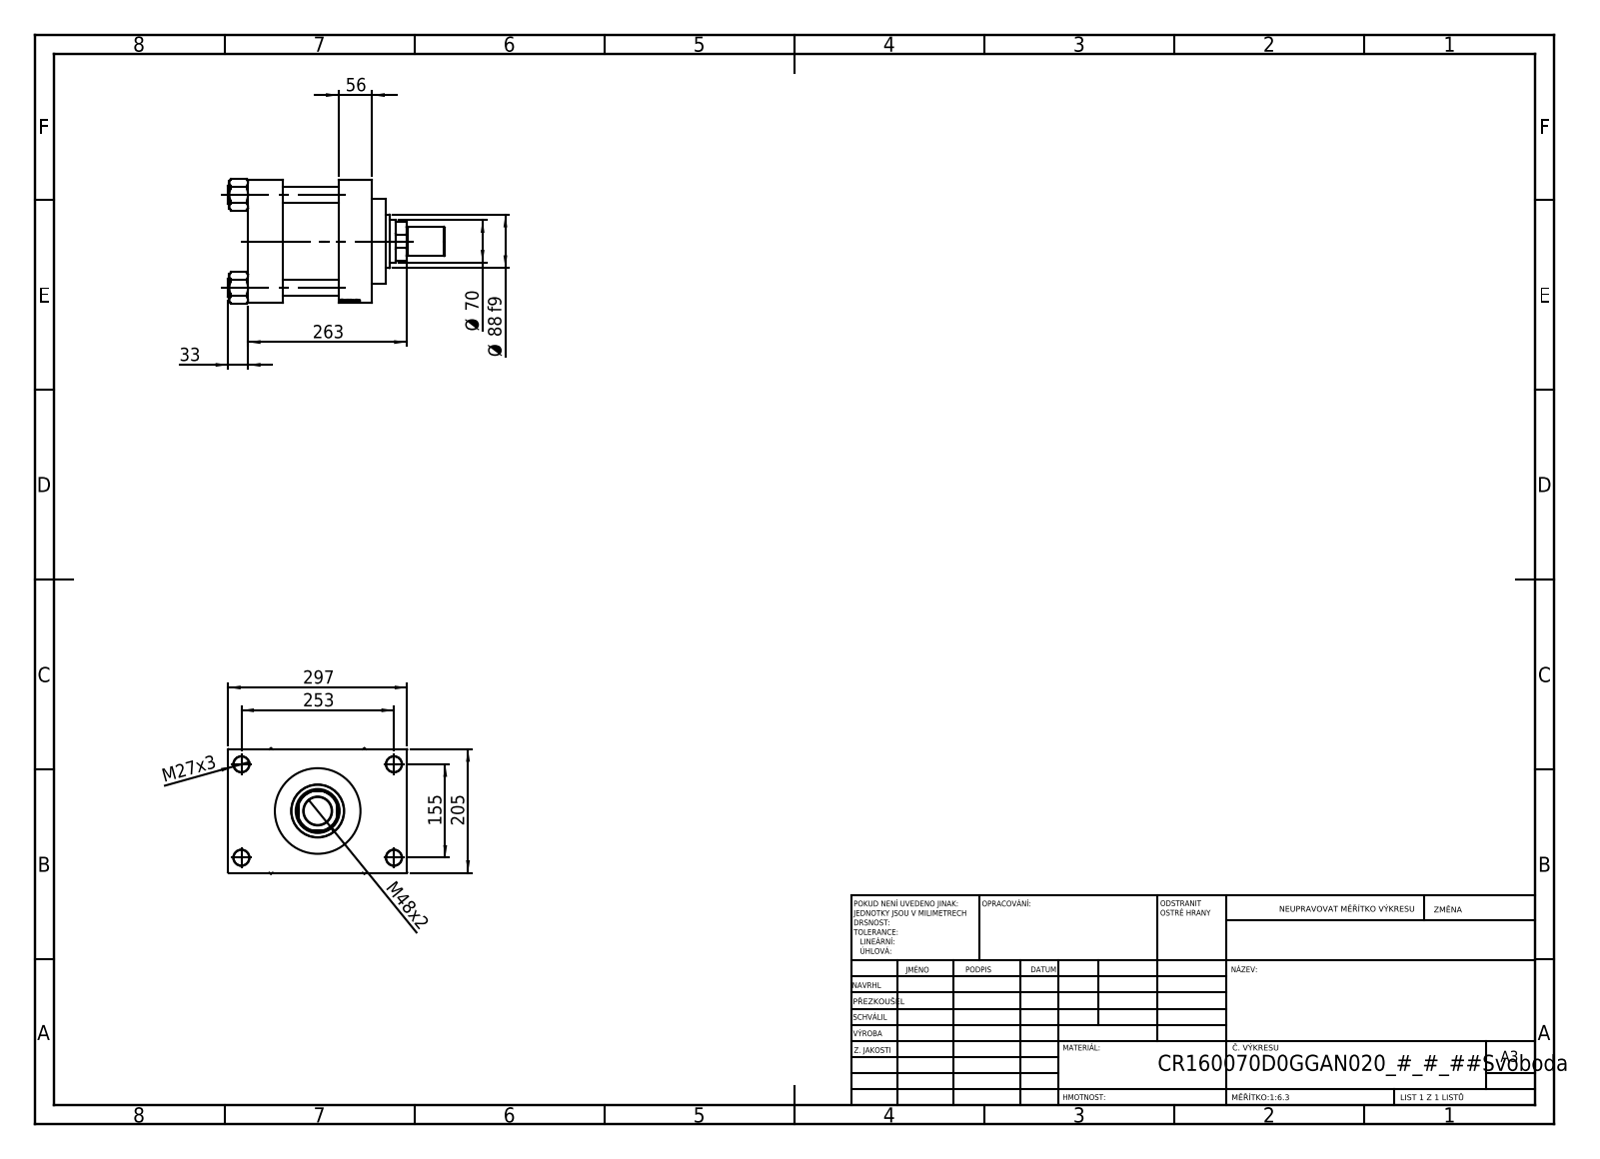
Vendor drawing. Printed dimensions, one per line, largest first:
297
263
253
205
155
Ø 88 f9
Ø 70
56
M48x2
33
M27x3
